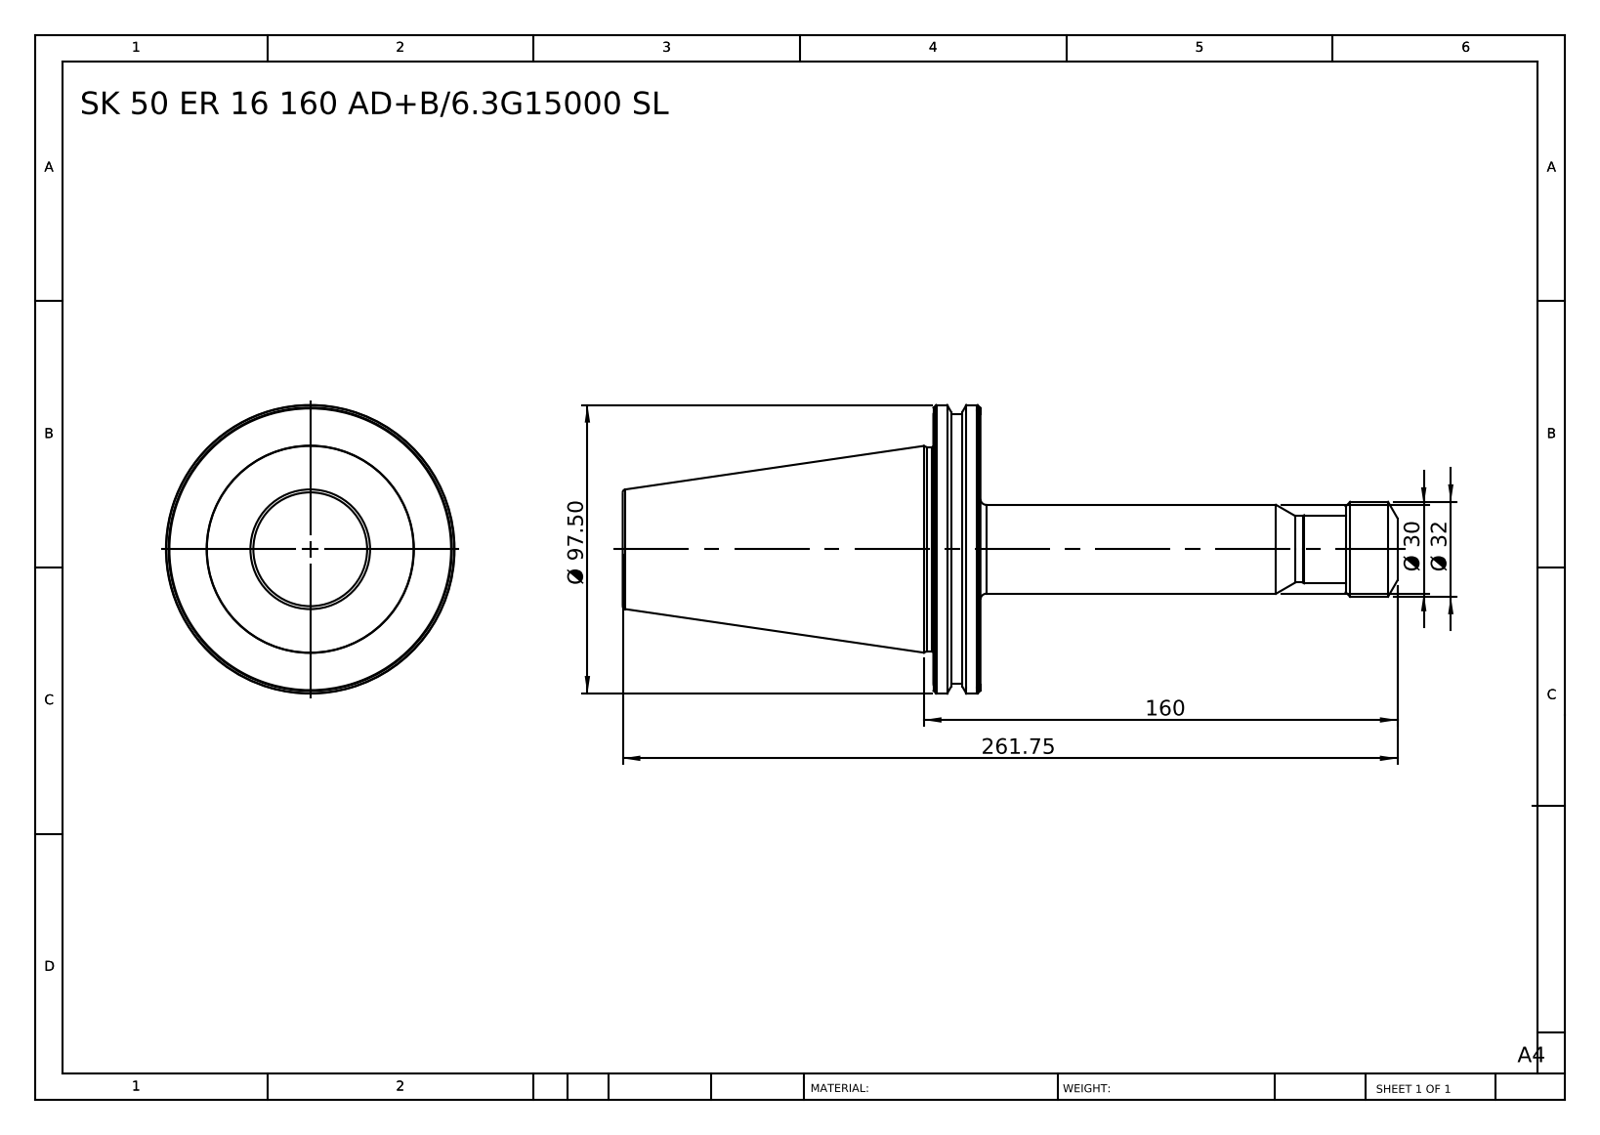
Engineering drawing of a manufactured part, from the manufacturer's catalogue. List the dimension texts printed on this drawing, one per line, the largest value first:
261.75
160
Ø 97.50
Ø 32
Ø 30
